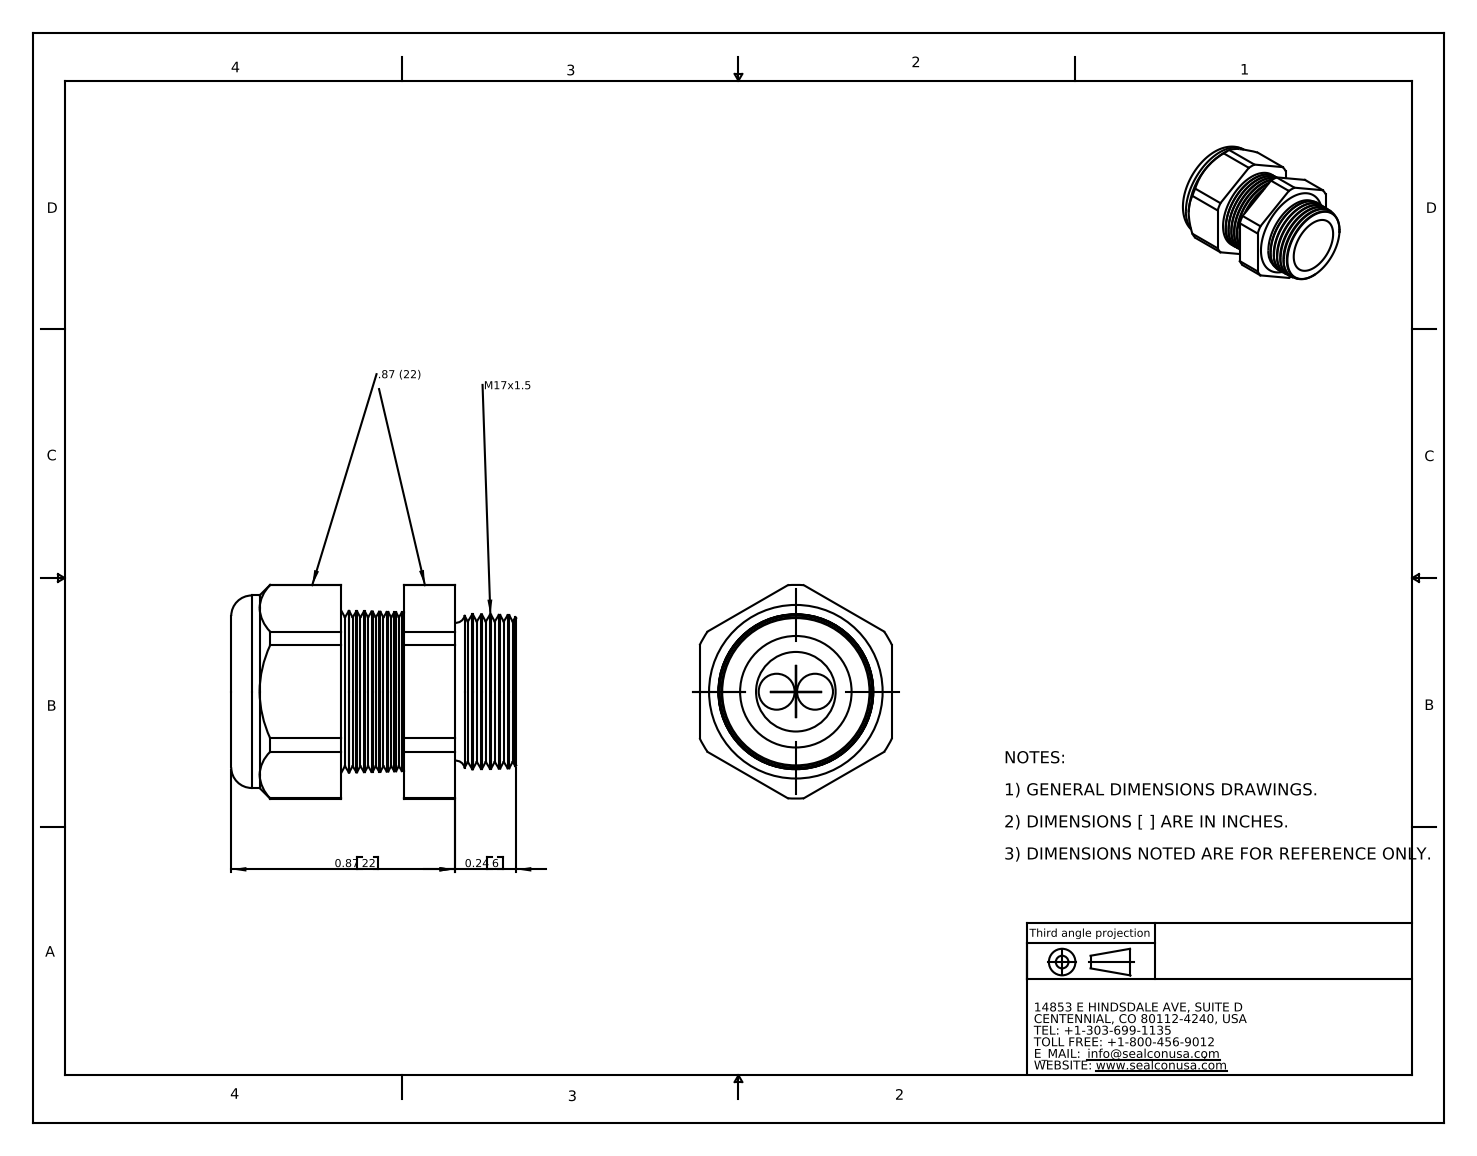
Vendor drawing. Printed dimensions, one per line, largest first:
0.87 22
0.24 6
